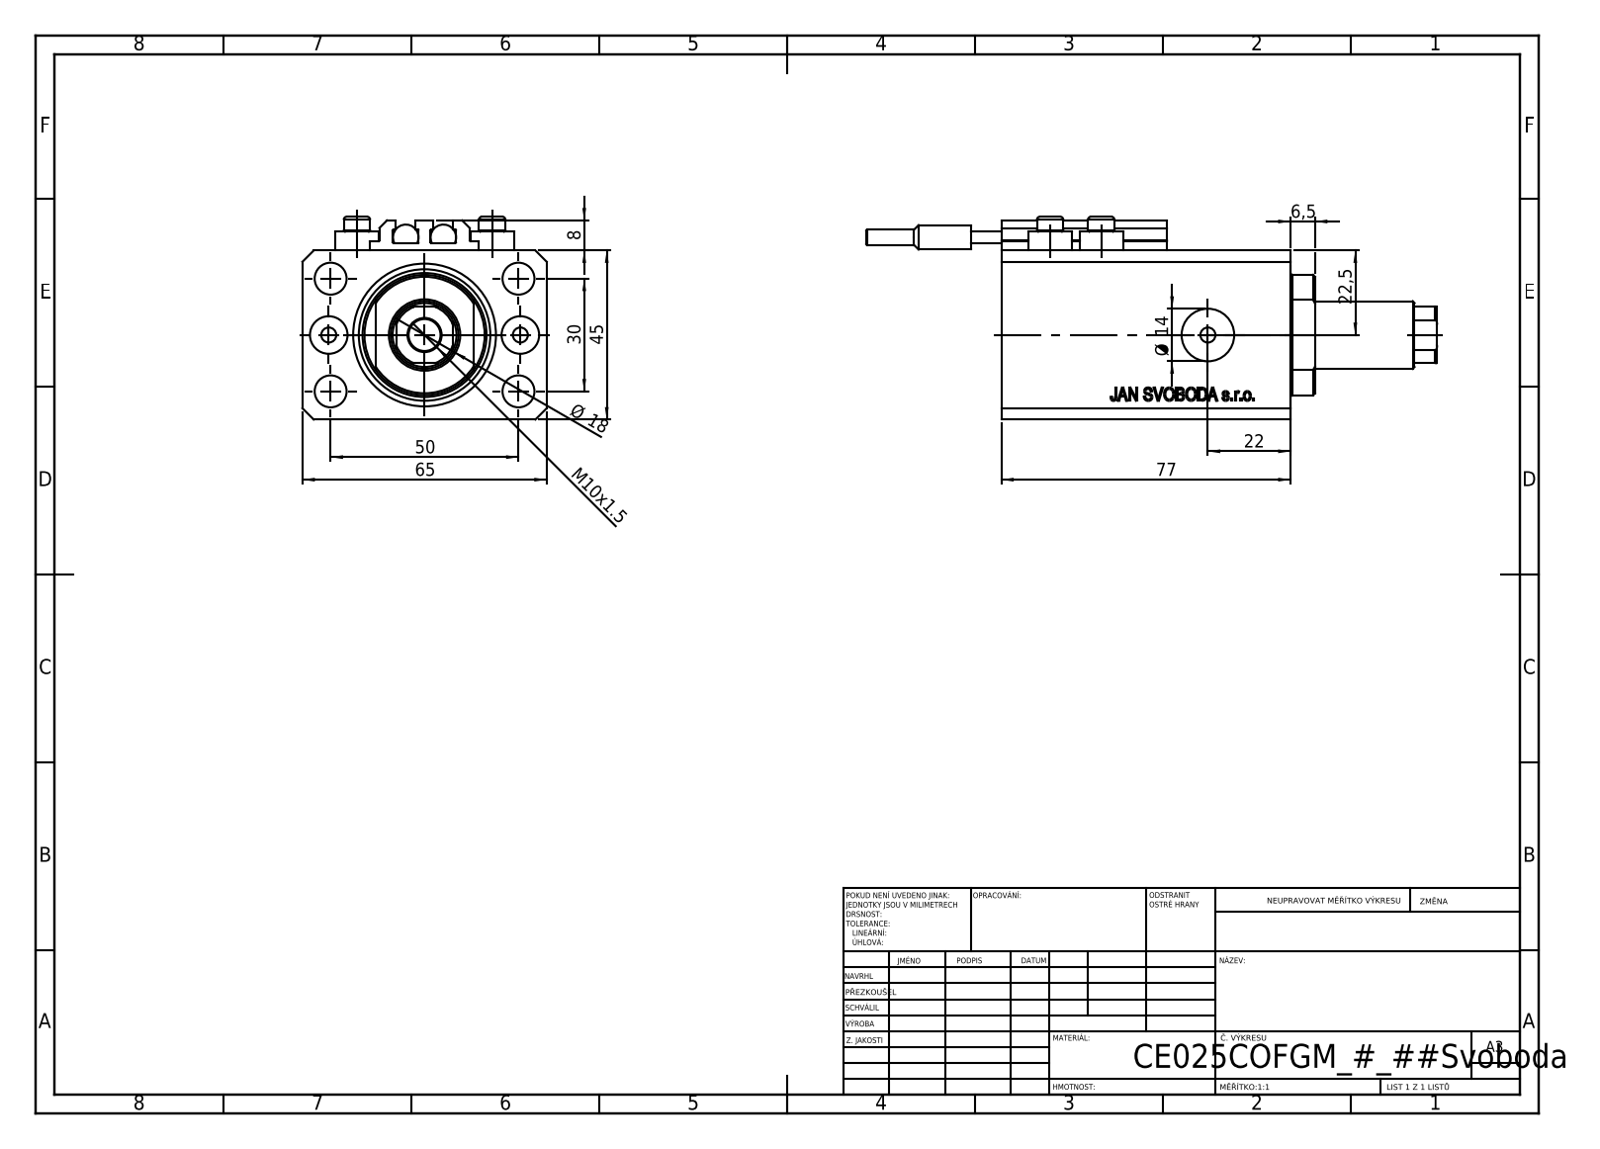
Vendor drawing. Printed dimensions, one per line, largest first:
77
65
50
45
30
22,5
22
Ø 18
Ø 14
M10x1.5
8
6,5
